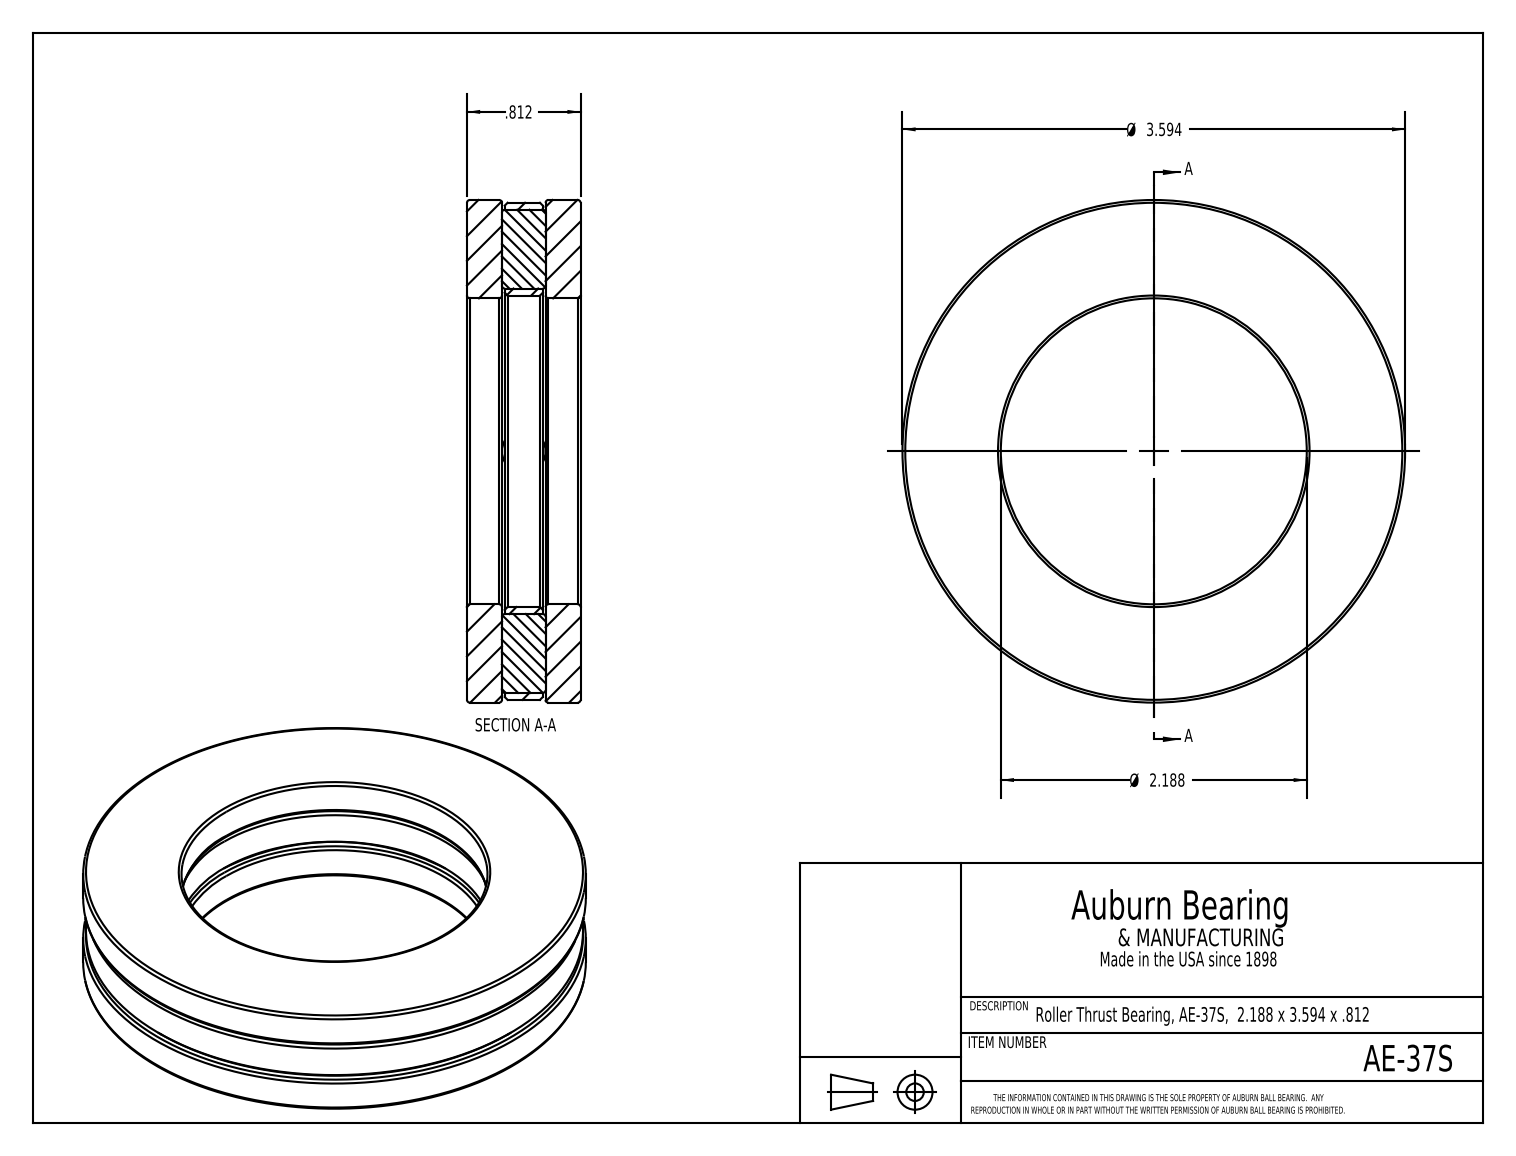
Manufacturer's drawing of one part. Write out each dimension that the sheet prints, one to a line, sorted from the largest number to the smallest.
Ø 3.594
Ø 2.188
.812
